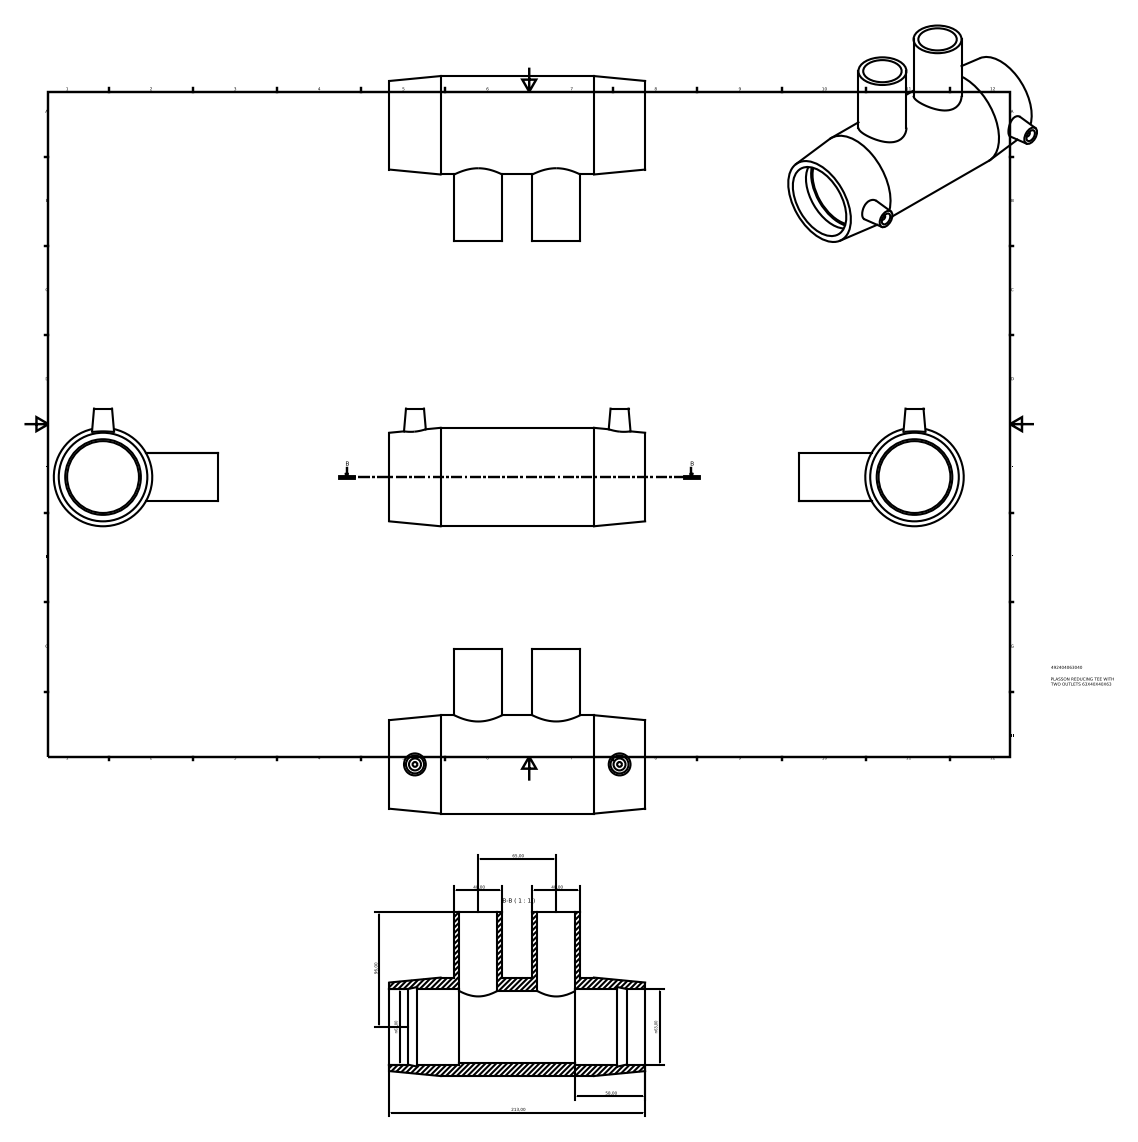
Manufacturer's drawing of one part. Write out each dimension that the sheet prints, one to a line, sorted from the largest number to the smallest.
213,00
96,00
65,00
n63,00
n63,00
58,00
40,00
40,00
